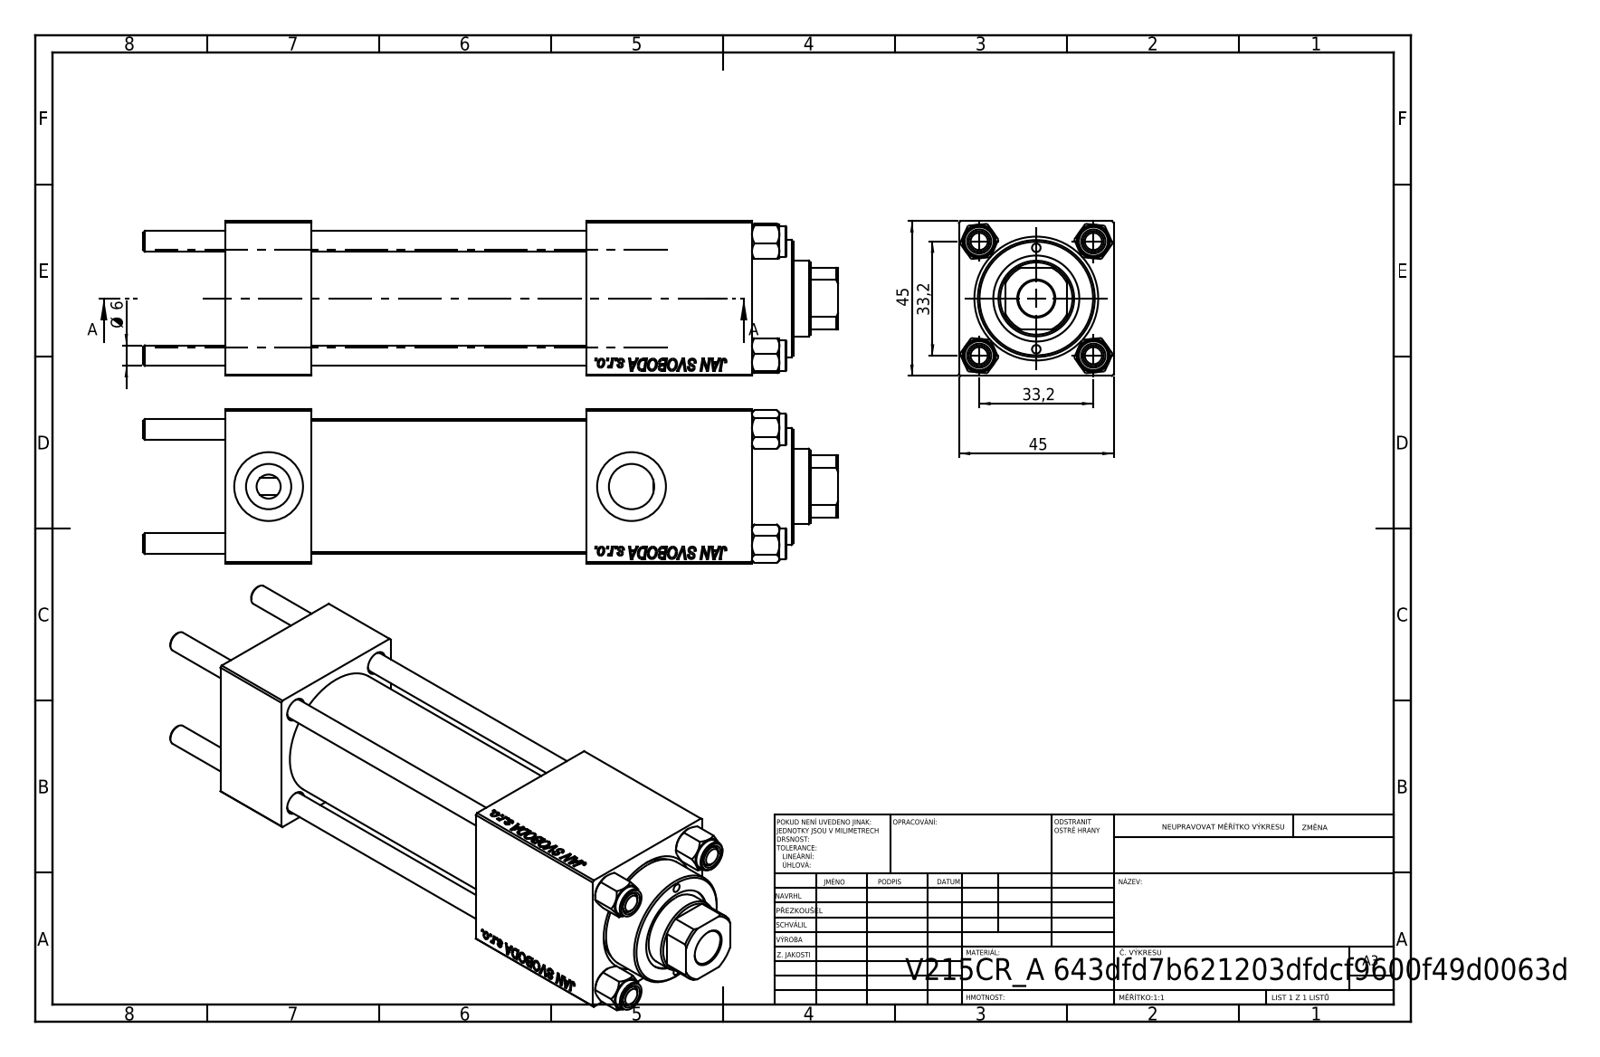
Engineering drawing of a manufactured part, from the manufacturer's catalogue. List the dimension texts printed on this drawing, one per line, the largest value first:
45
45
33,2
33,2
Ø 6
